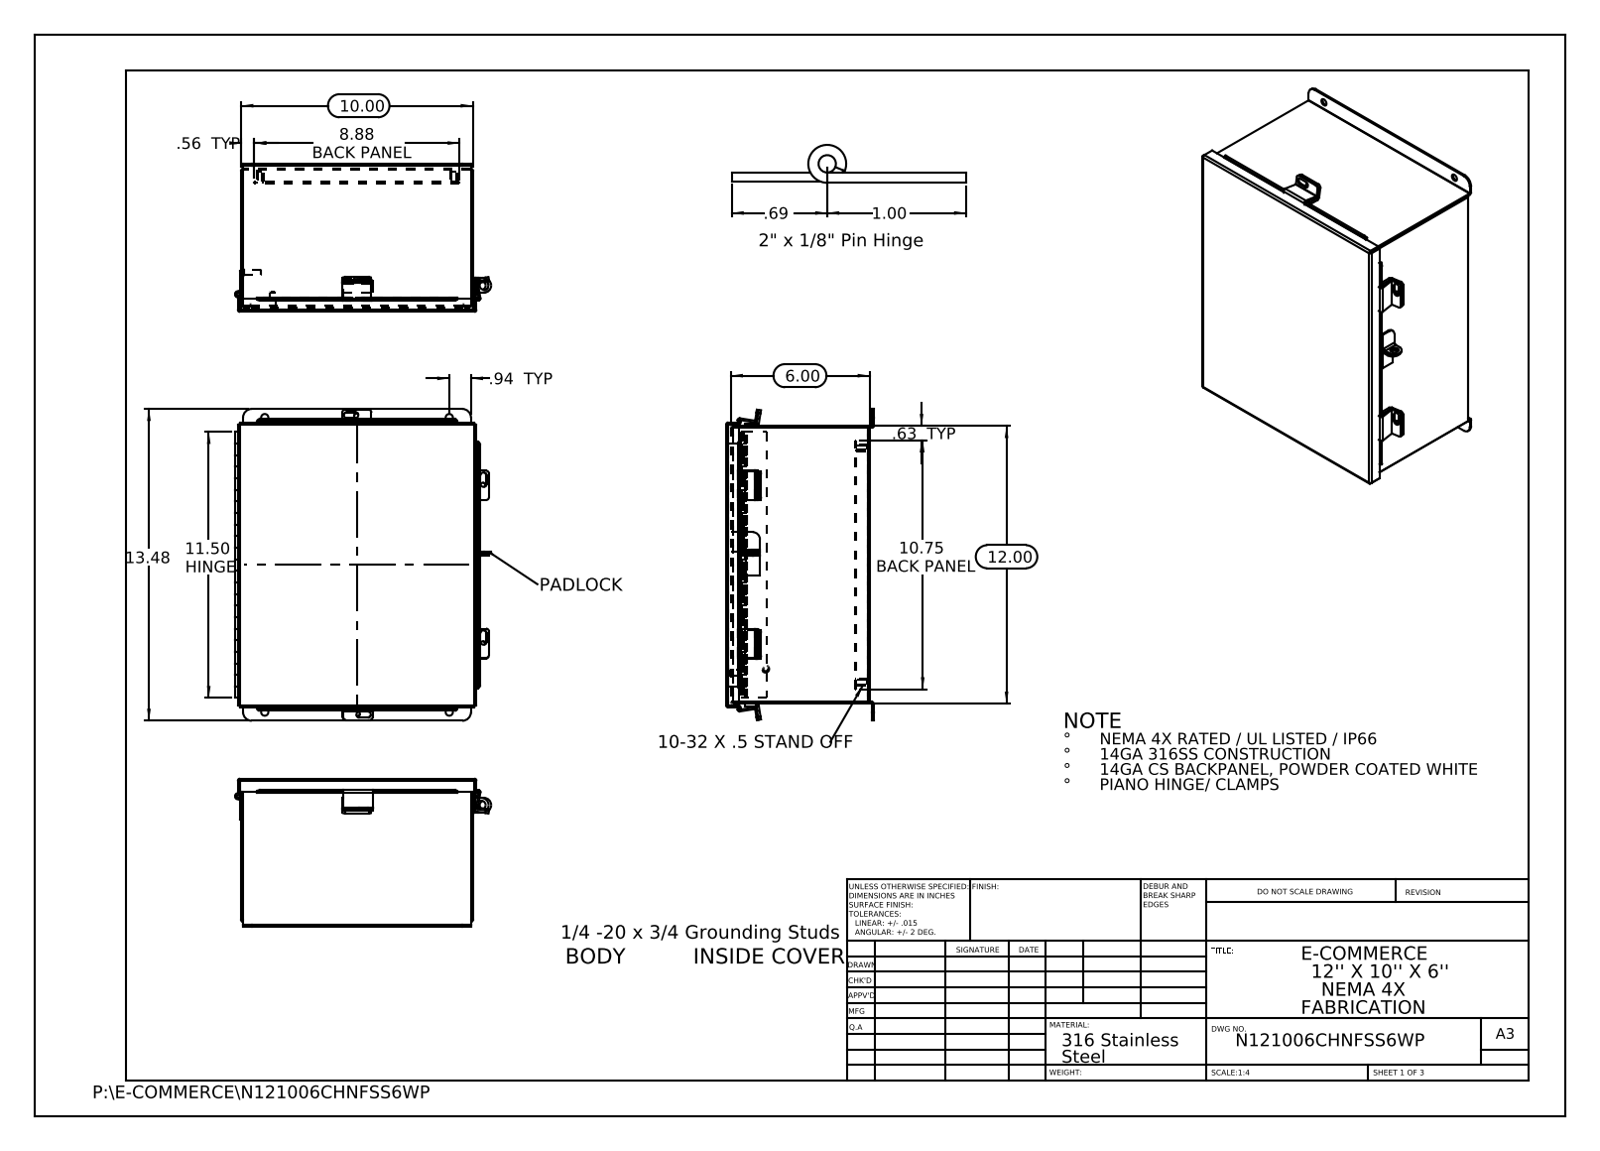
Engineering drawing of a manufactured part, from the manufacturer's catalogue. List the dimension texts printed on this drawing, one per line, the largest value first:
13.48
12.00
11.50 HINGE
10.75 BACK PANEL
10.00
8.88 BACK PANEL
6.00
1.00
.94 TYP
.69
.63 TYP
.56 TYP
